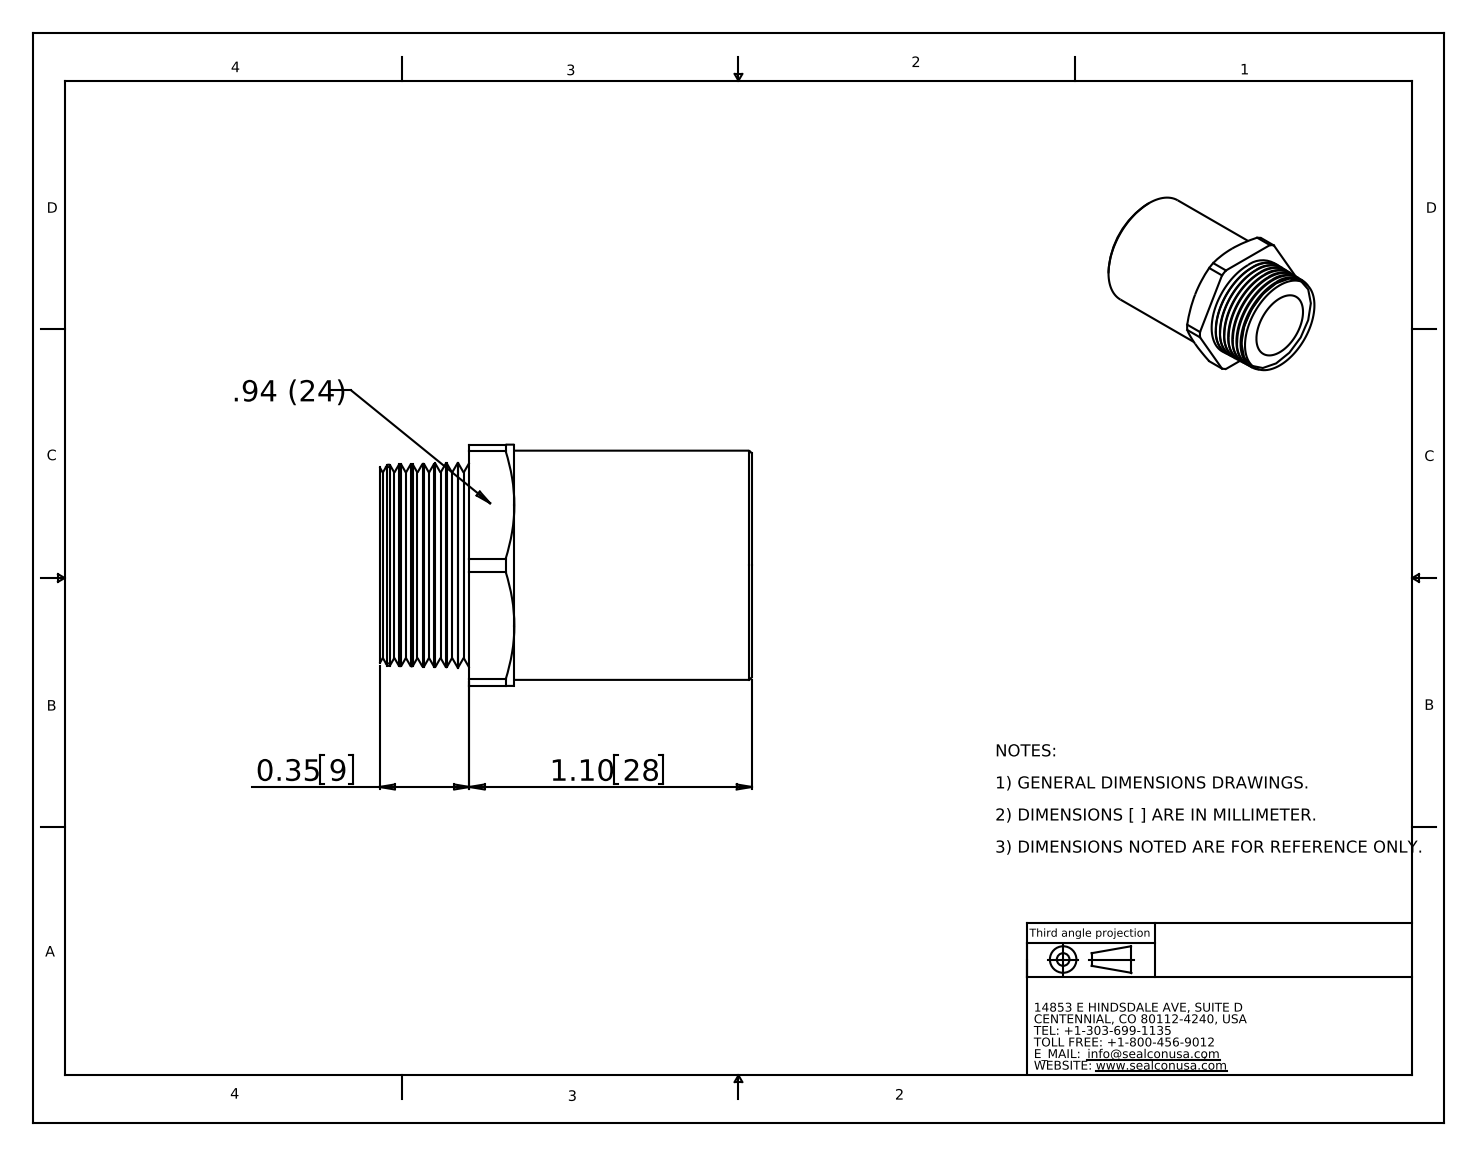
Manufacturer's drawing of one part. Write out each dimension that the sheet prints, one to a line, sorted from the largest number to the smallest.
1.10 28
0.35 9
